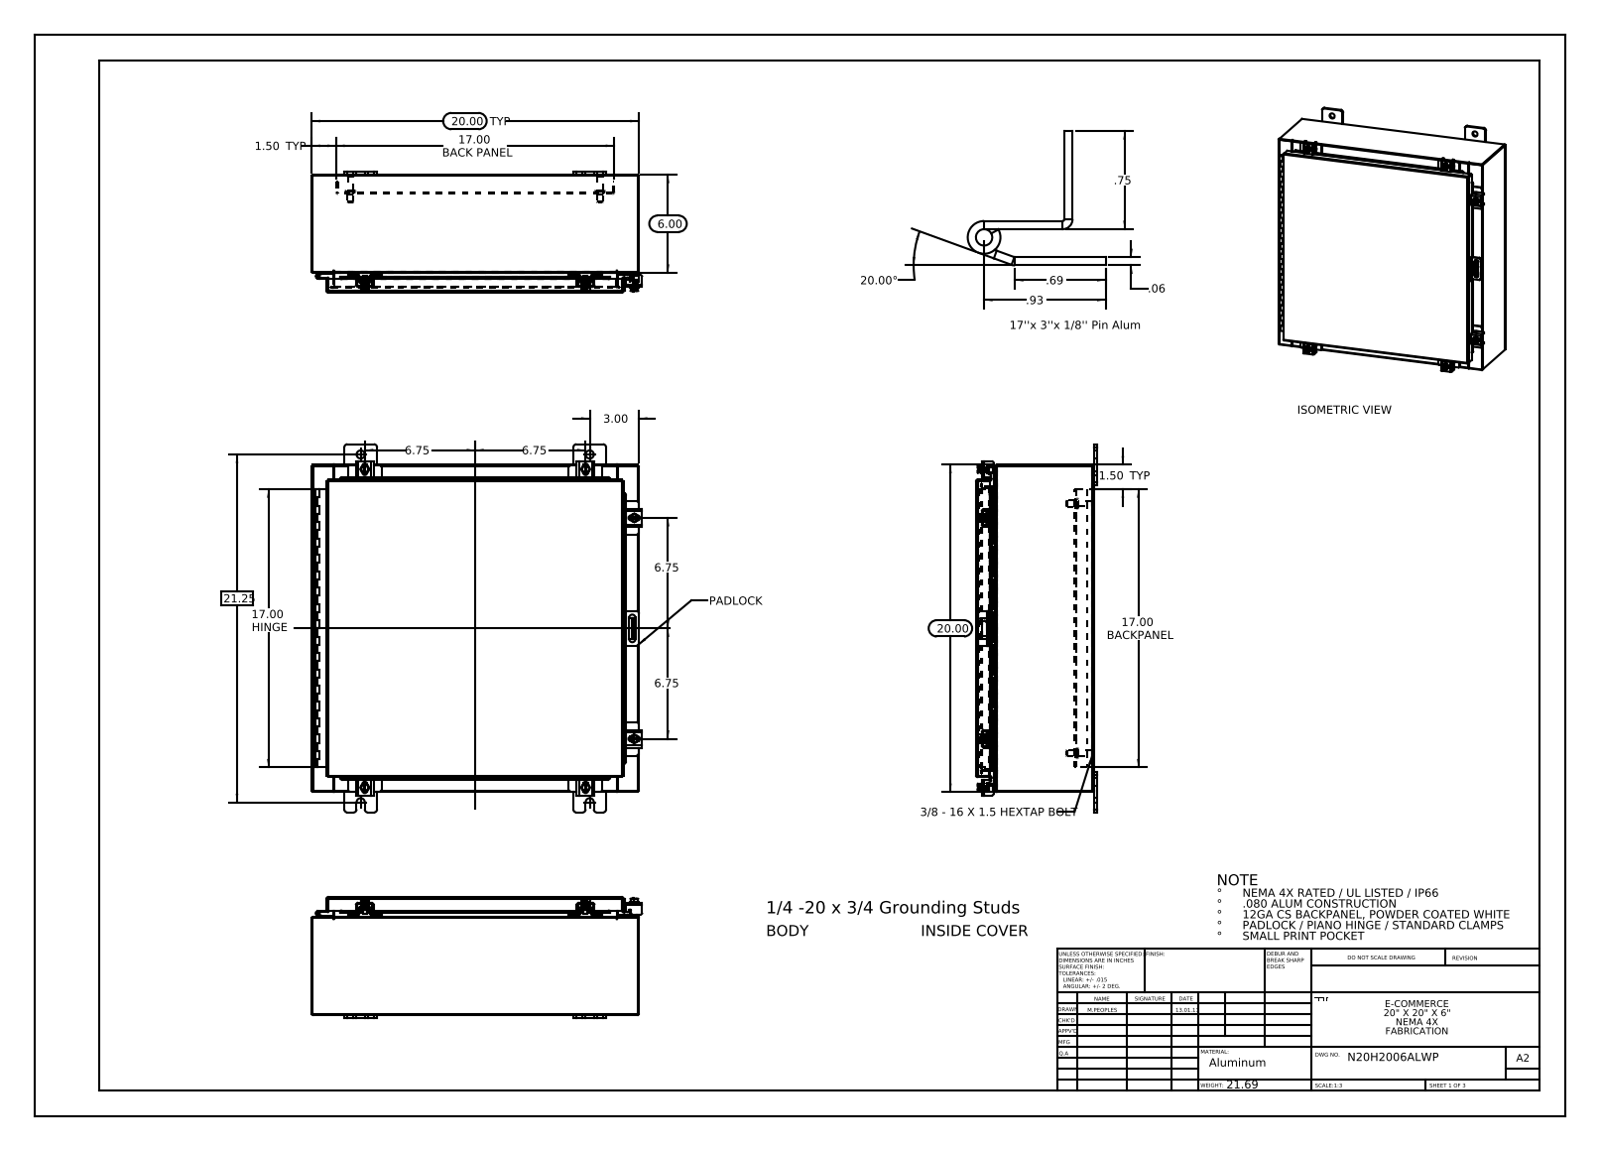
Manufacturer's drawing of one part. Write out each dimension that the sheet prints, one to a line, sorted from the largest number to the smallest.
21.25
20.00 TYP
20.00
20.00°
17.00 HINGE
17.00 BACK PANEL
17.00 BACKPANEL
6.75
6.75
6.75
6.75
6.00
3.00
1.50 TYP
1.50 TYP
.93
.75
.69
.06
